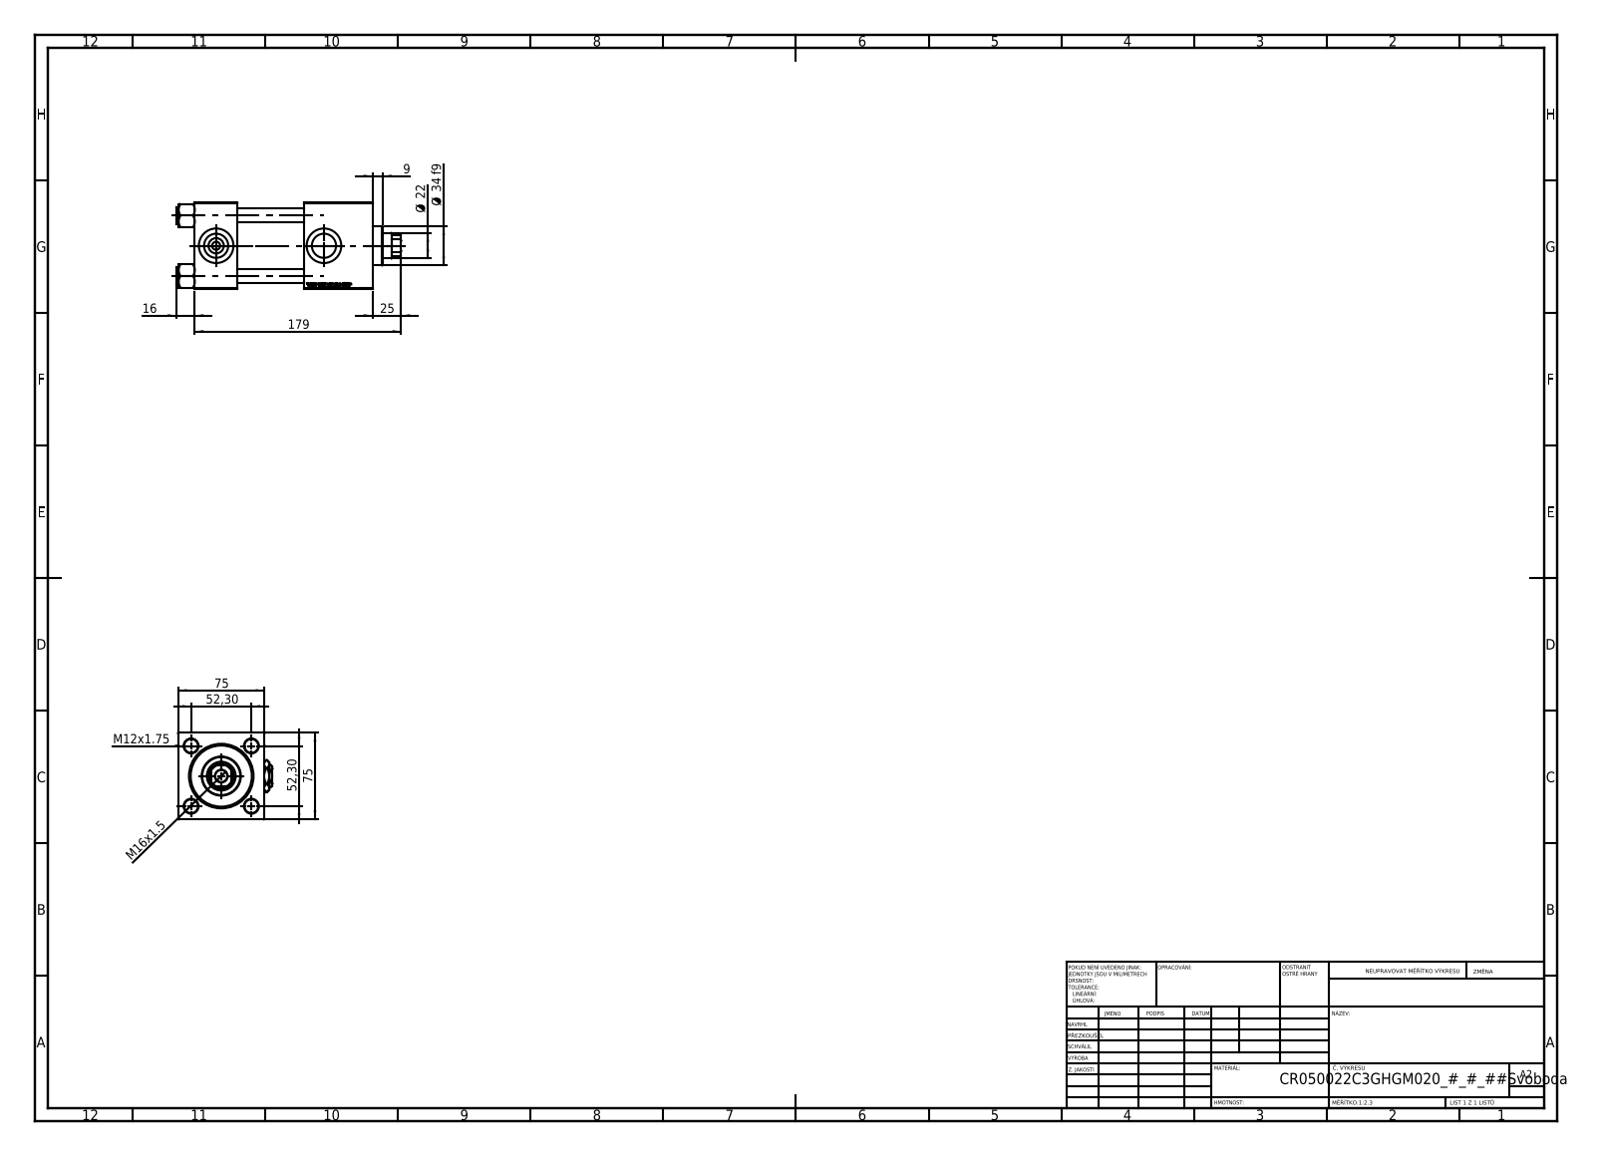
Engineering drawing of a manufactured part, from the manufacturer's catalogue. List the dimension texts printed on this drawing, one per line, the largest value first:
179
75
75
52,30
52,30
Ø 34 f9
25
Ø 22
16
M16x1.5
M12x1.75
9
